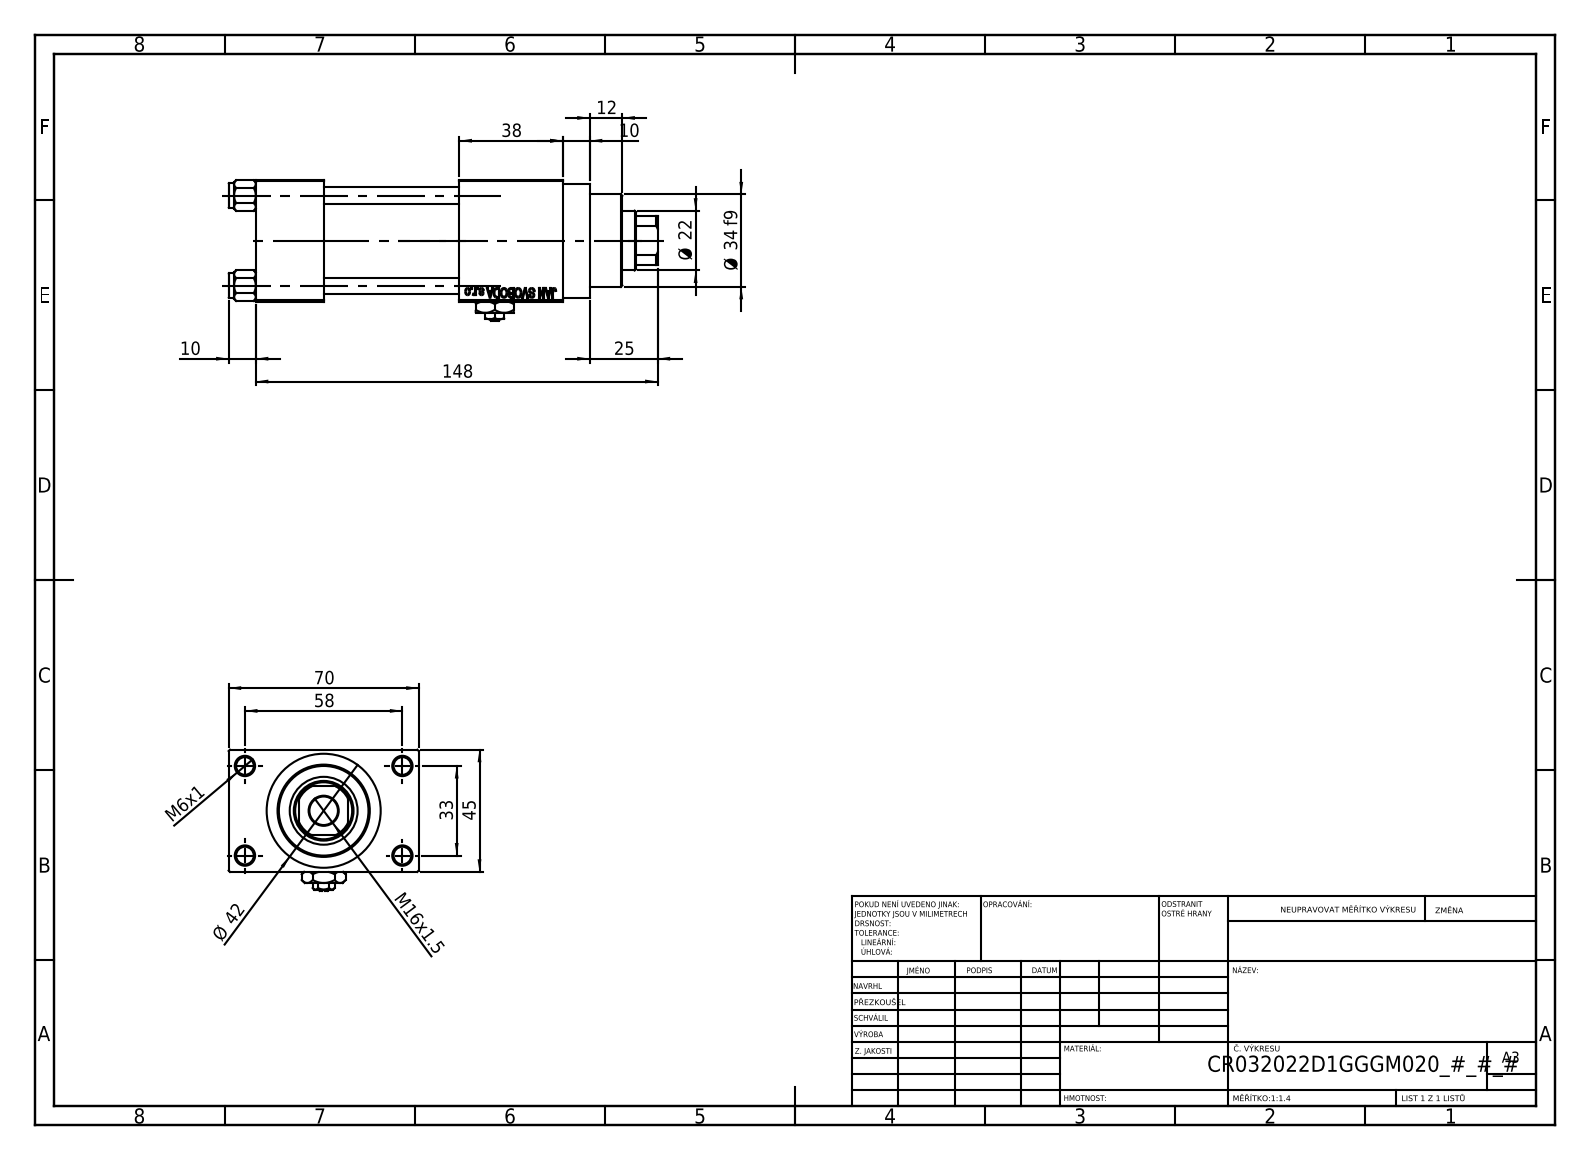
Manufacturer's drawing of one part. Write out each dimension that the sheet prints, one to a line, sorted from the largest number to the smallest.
148
70
58
45
Ø 42
38
Ø 34 f9
33
25
Ø 22
M16x1.5
12
10
10
M6x1
